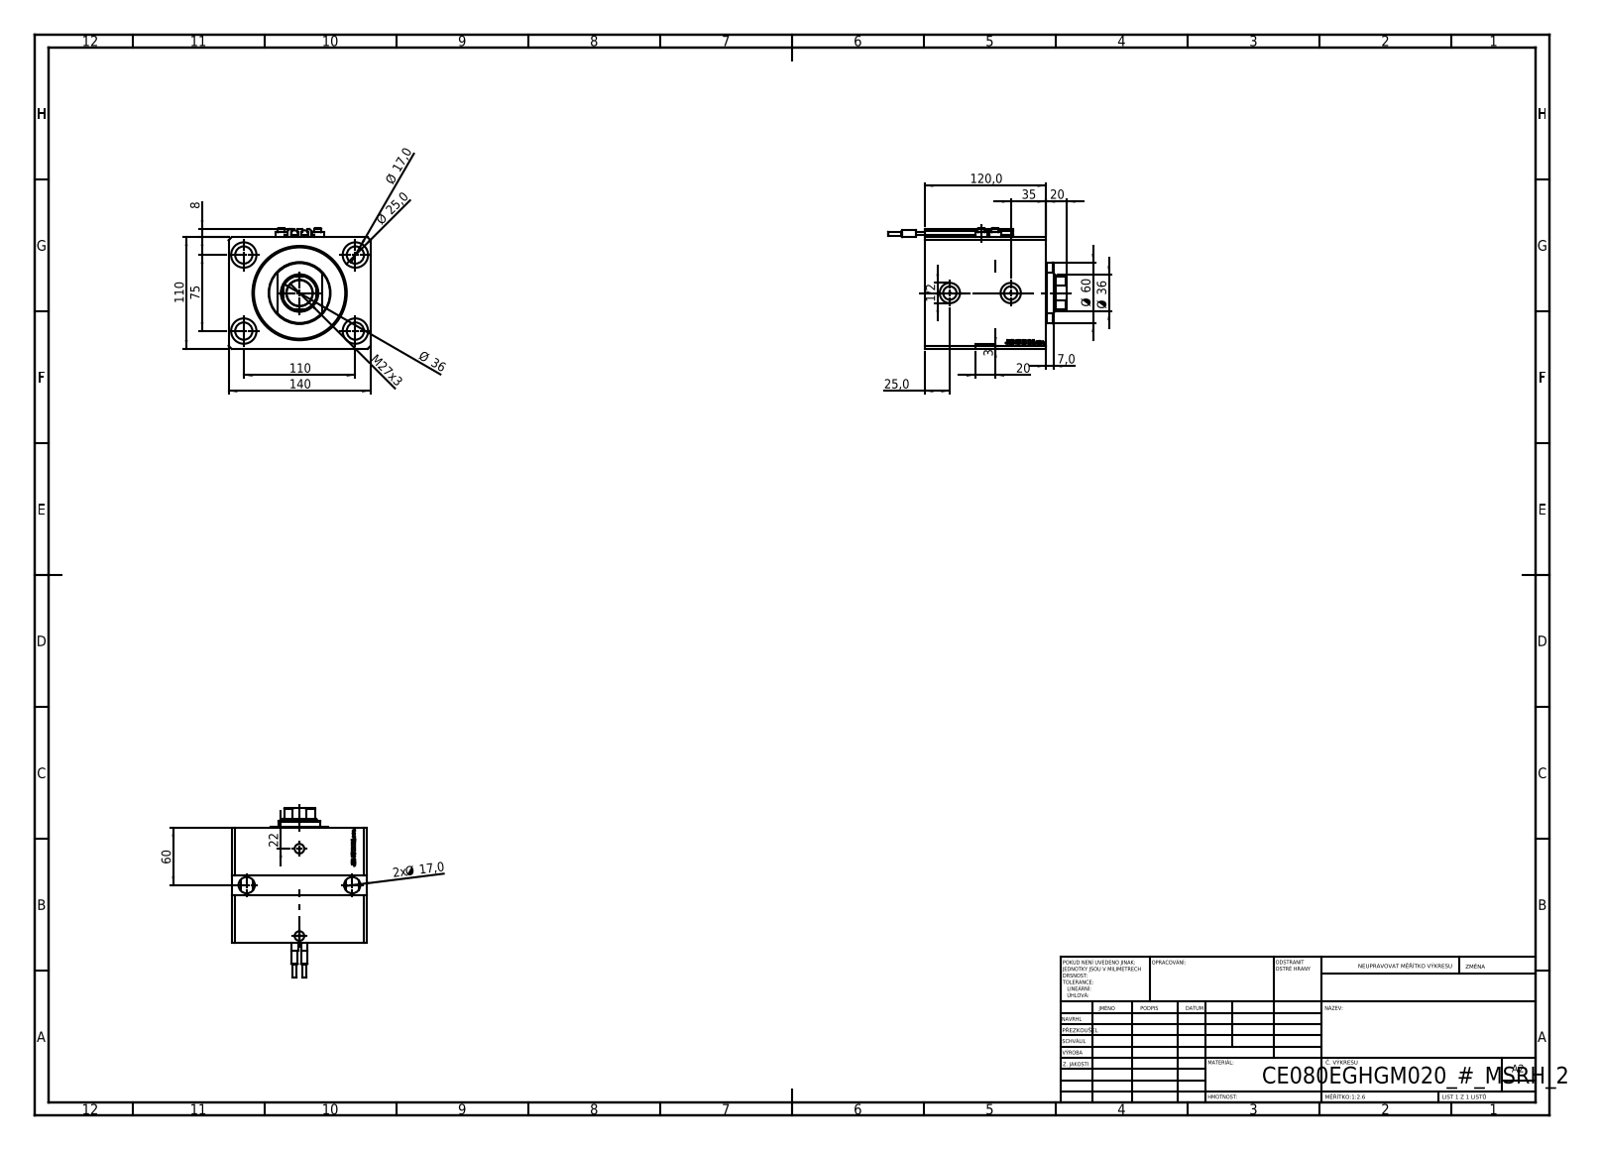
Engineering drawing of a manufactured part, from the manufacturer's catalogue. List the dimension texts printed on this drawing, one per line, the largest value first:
140
120,0
110
110
75
Ø 60
60
Ø 36
Ø 36
35
M27x3
Ø 25,0
25,0
22
20
20
Ø 17,0
2x Ø 17,0
8
7,0
3
1/2
